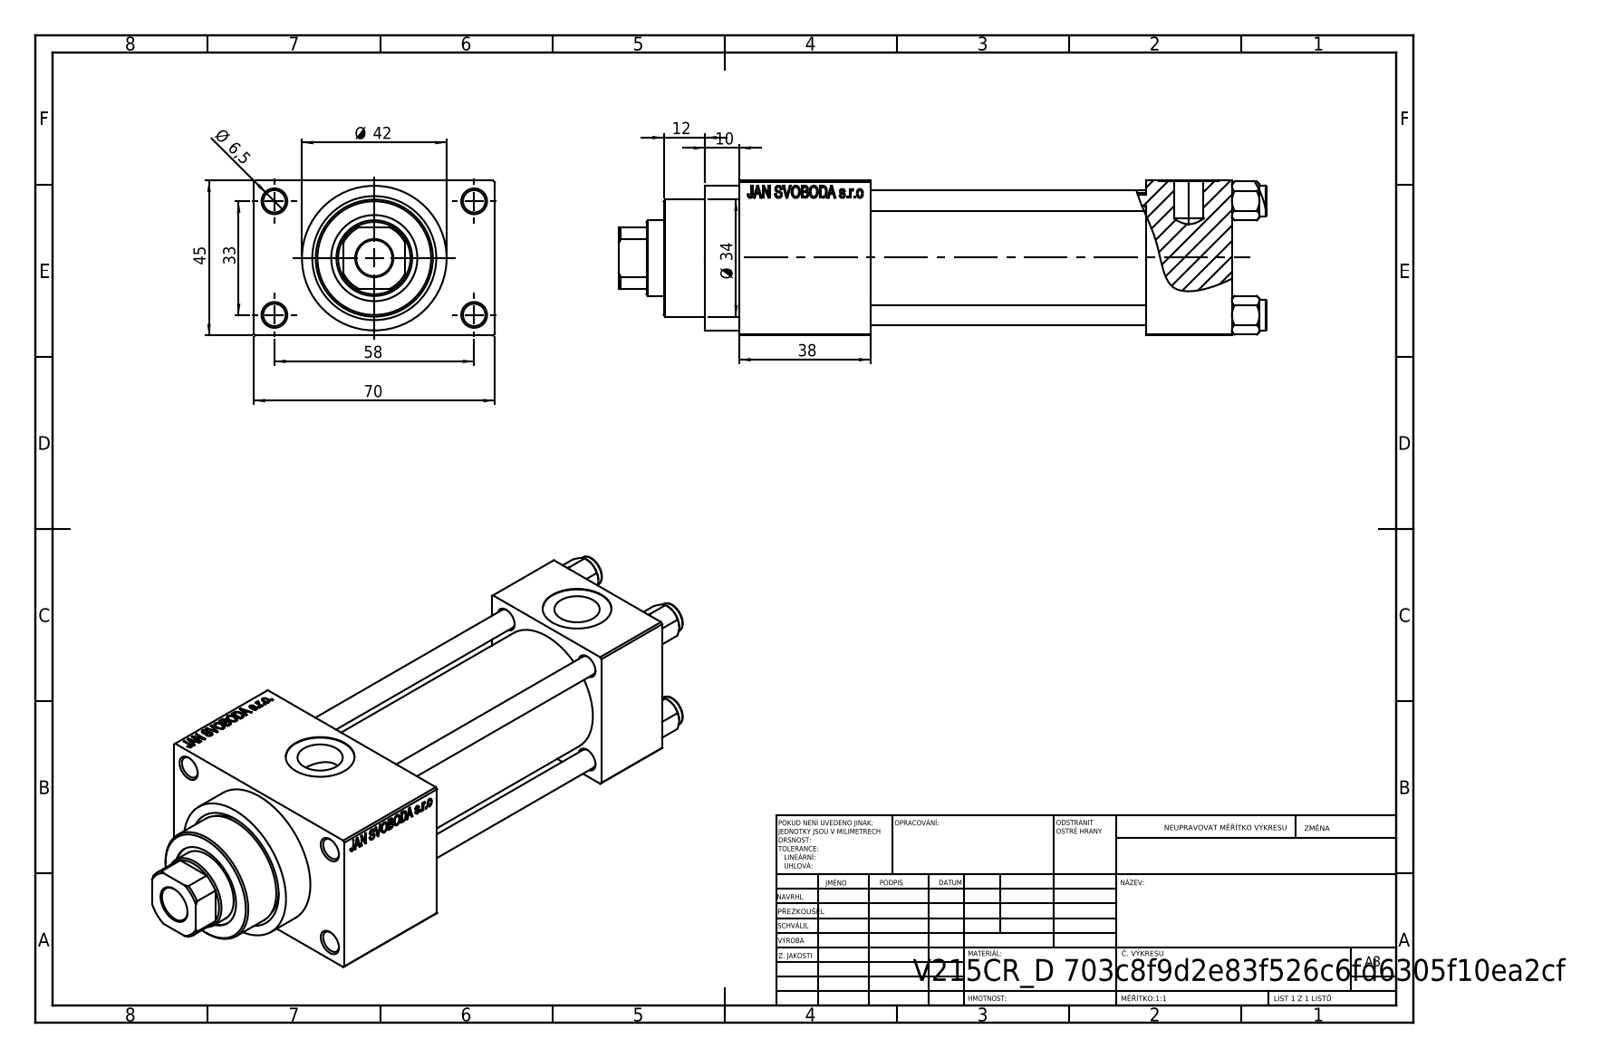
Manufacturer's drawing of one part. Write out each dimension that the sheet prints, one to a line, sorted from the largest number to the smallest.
70
58
45
Ø 42
38
Ø 34
33
12
10
Ø 6,5
